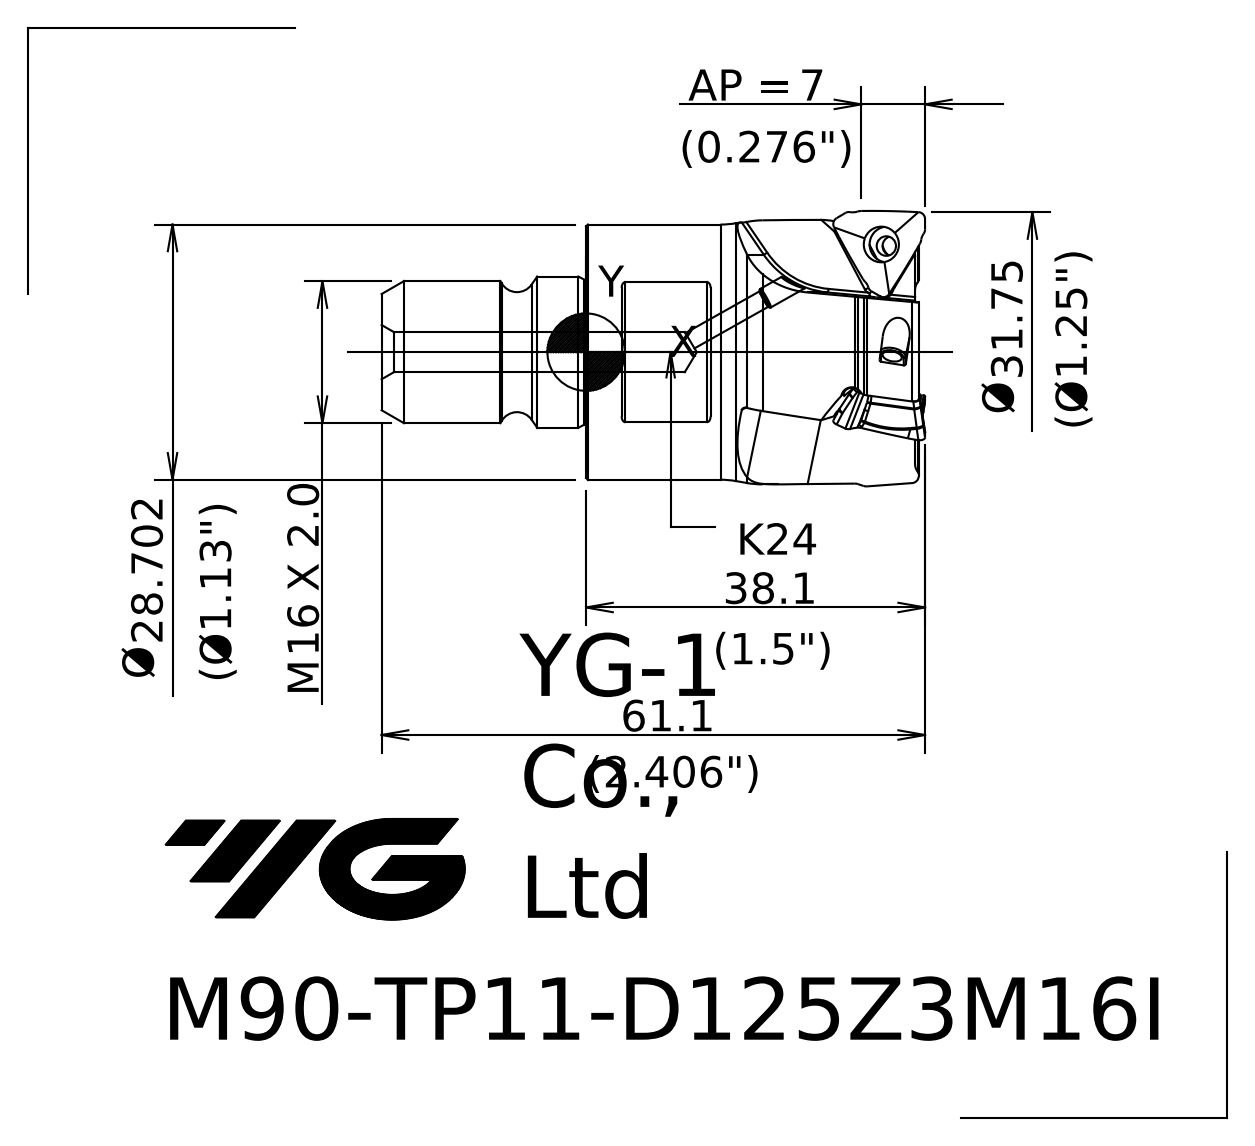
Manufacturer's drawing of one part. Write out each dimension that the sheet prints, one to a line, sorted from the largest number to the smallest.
61.1
38.1
31.75 Ø
28.702 Ø
AP = 7
M X 2.0 16
